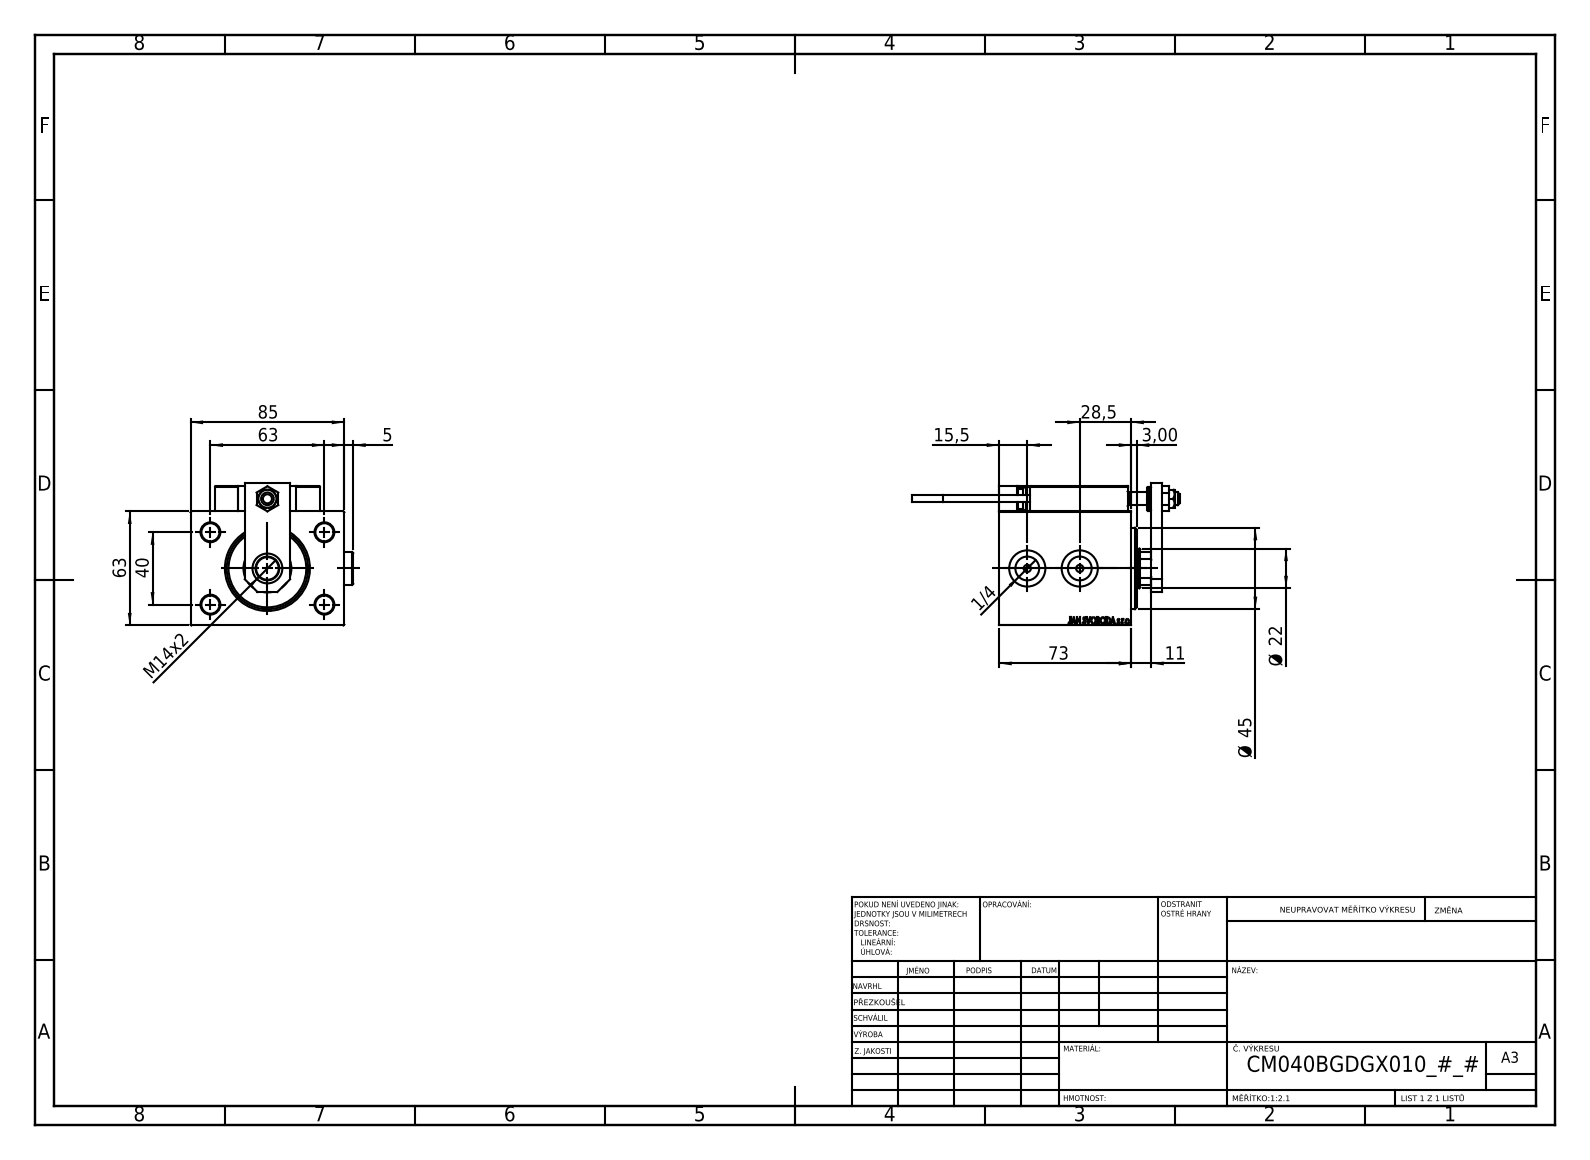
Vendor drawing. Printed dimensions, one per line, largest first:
85
73
63
63
Ø 45
40
28,5
Ø 22
15,5
M14x2
11
5
3,00
1/4
